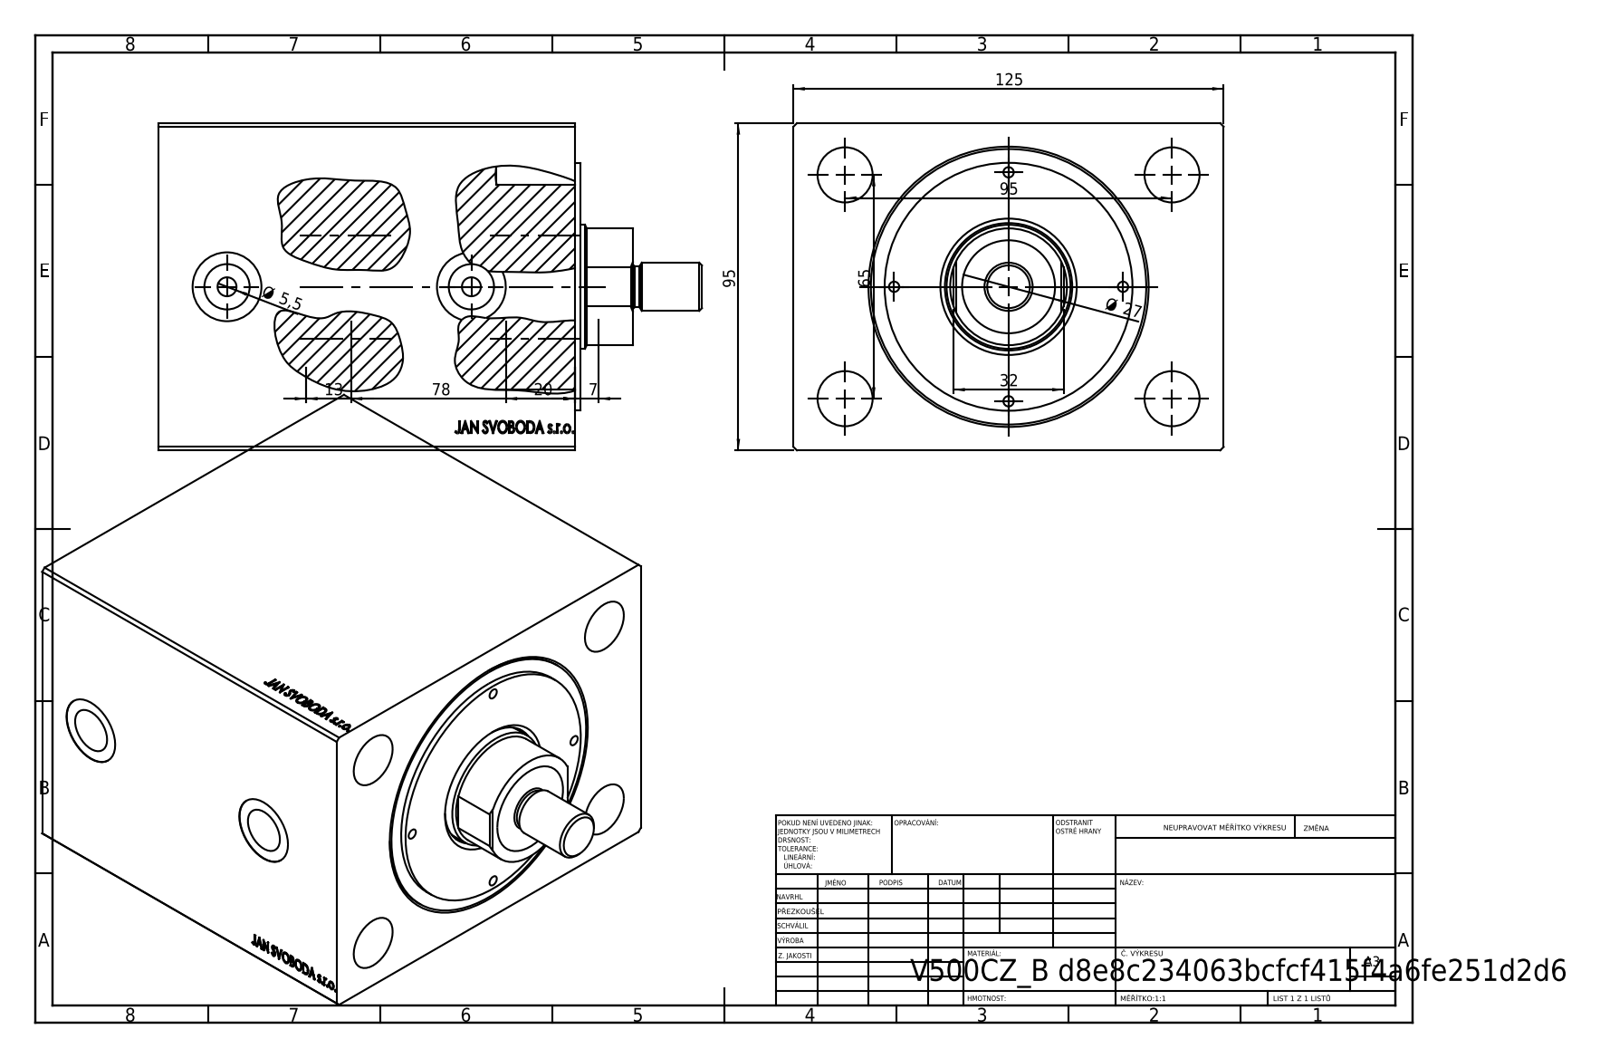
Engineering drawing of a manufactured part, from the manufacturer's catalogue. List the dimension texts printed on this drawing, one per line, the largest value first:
125
95
95
78
65
32
Ø 27
20
13
7
Ø 5,5
